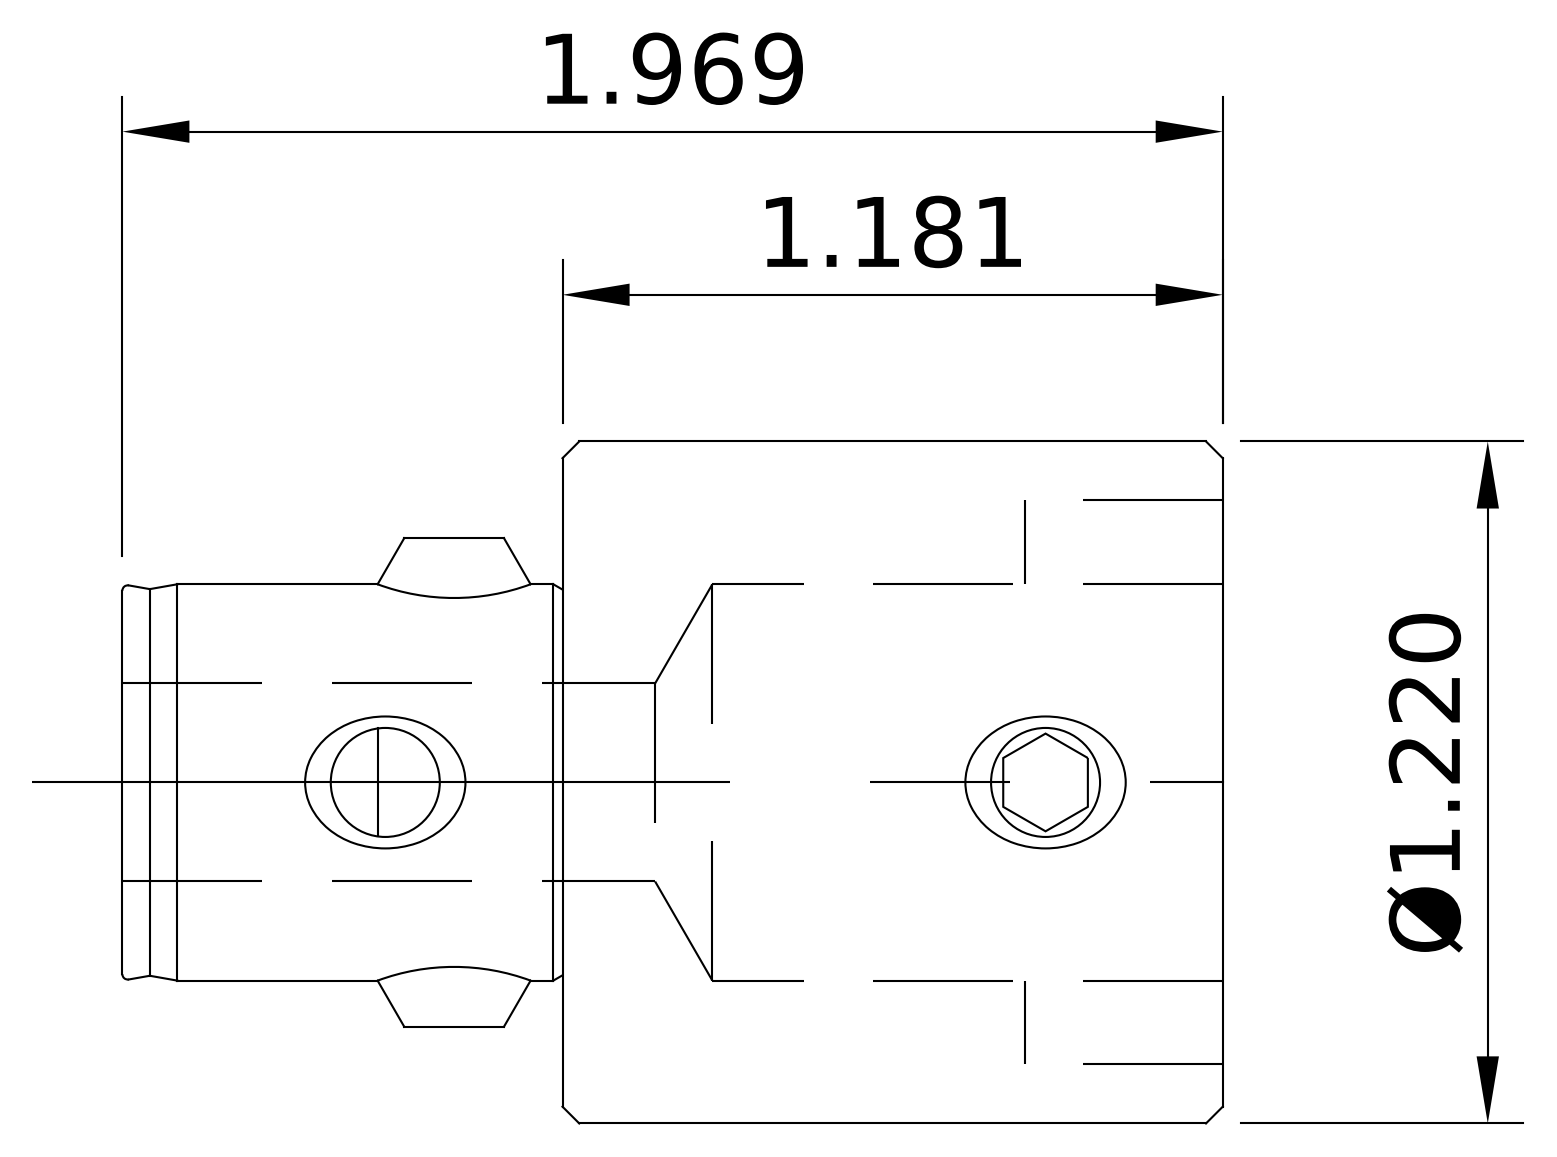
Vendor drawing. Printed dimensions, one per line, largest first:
1.969
Ø1.220
1.181
